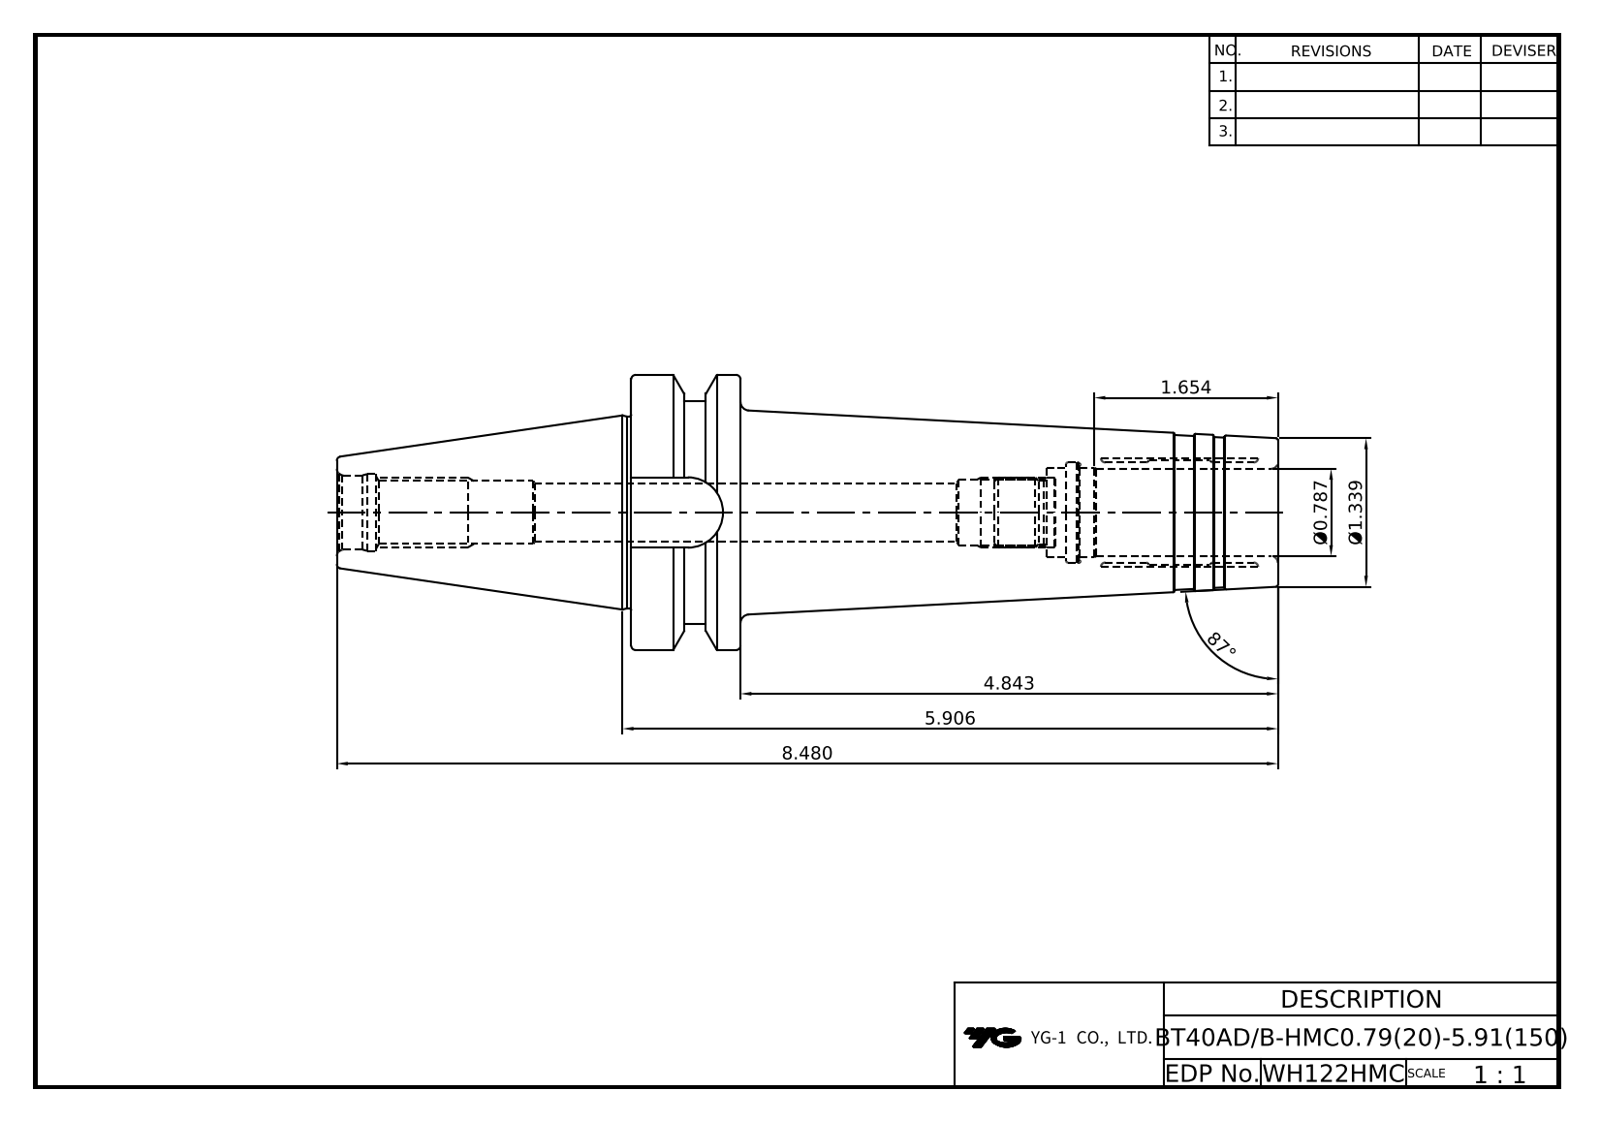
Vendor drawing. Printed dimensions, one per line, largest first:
87°
8.480
5.906
4.843
1.654
Ø1.339
Ø0.787
